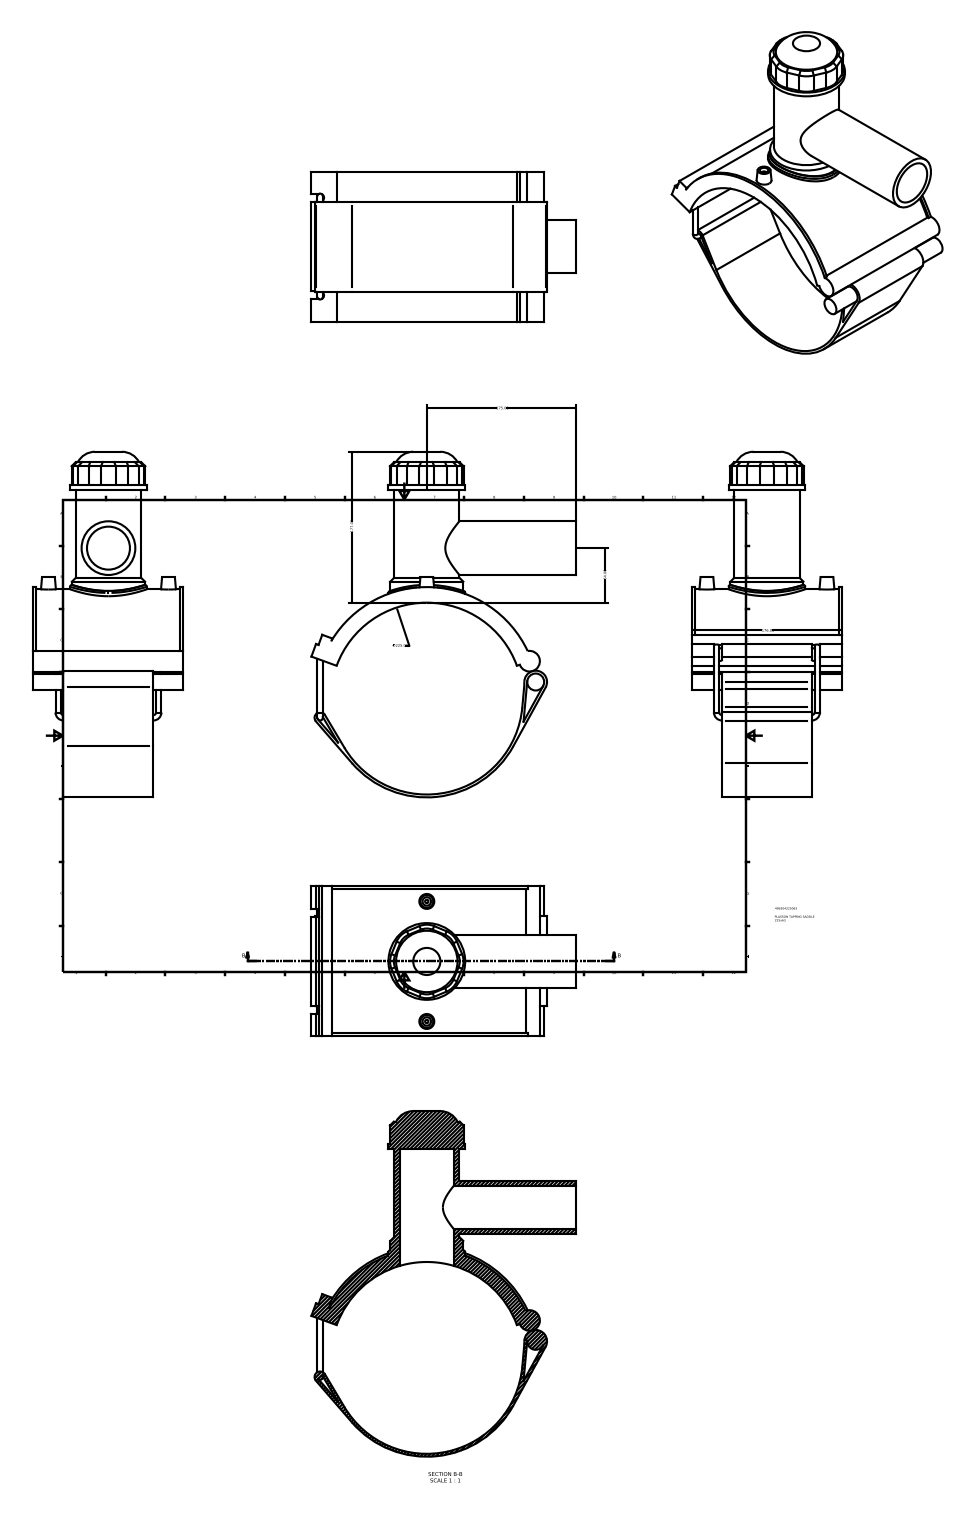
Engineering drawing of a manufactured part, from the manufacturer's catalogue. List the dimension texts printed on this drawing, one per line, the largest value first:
∅225.00
177.00
176.00
175.00
64.00
